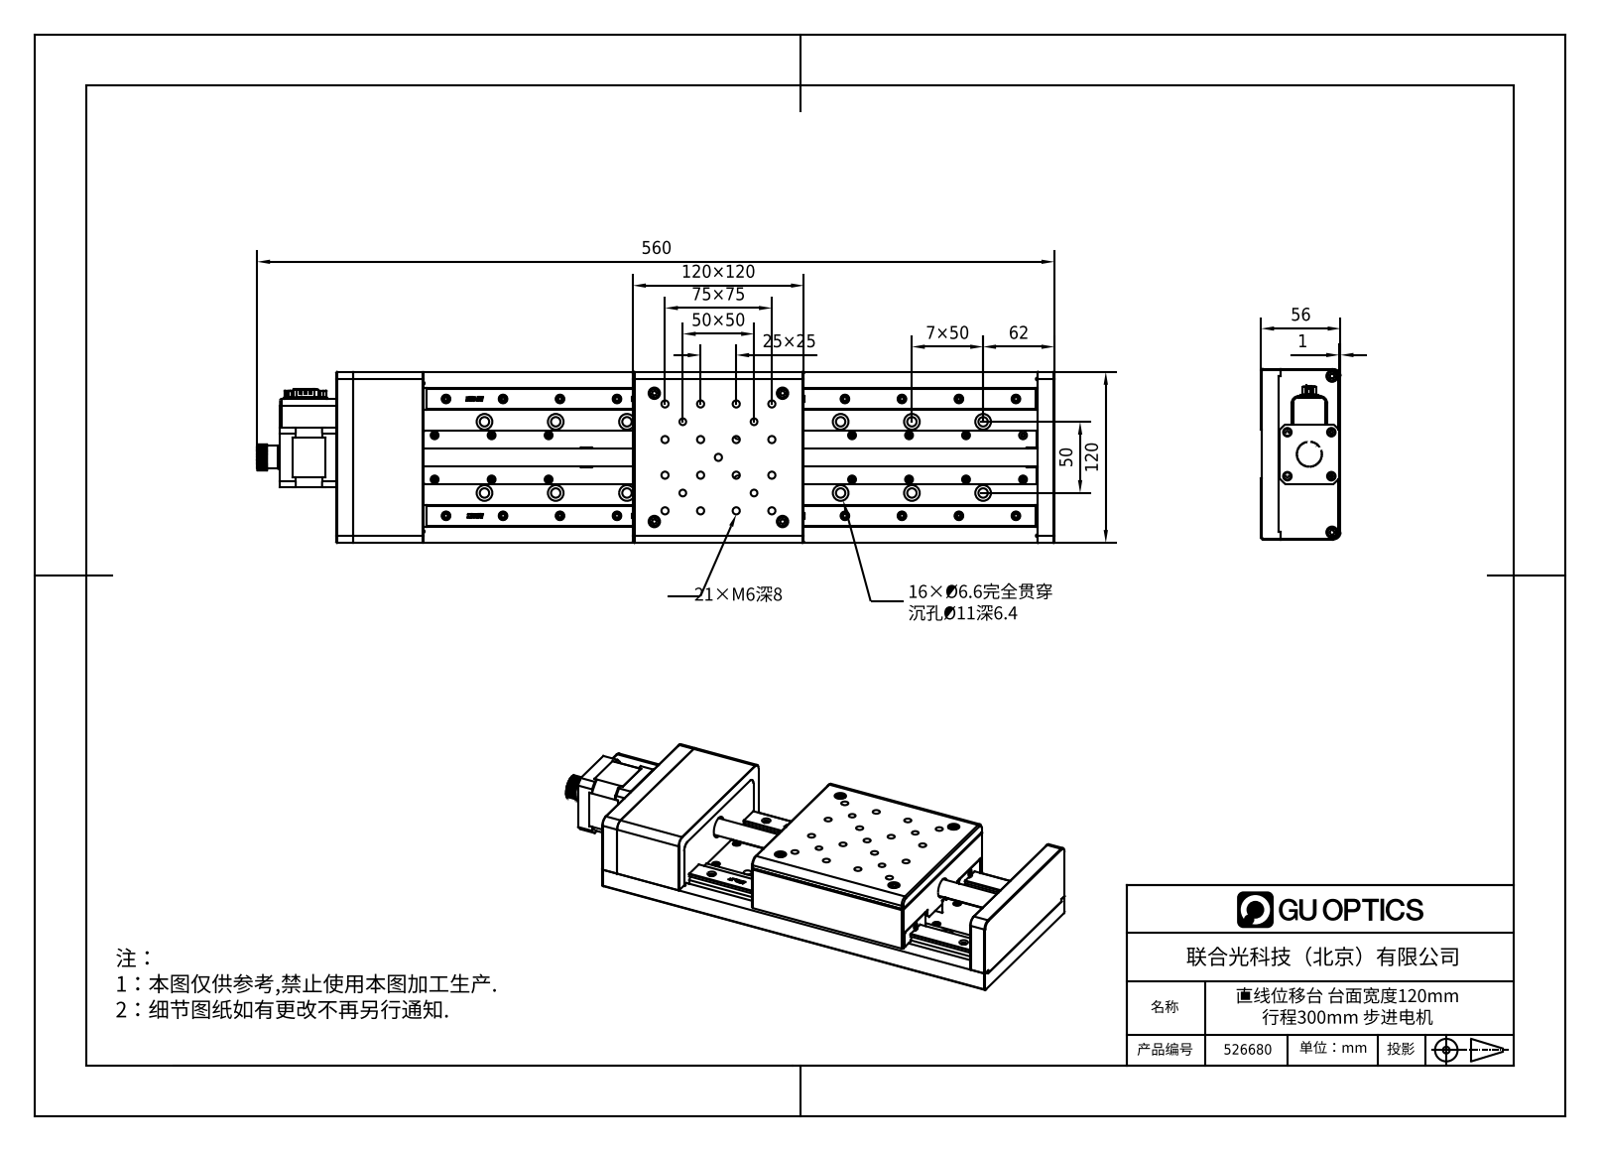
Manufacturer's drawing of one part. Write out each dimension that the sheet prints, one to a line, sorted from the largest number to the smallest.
560
120×120
120
75×75
62
56
50×50
50
7×50
25×25
1
